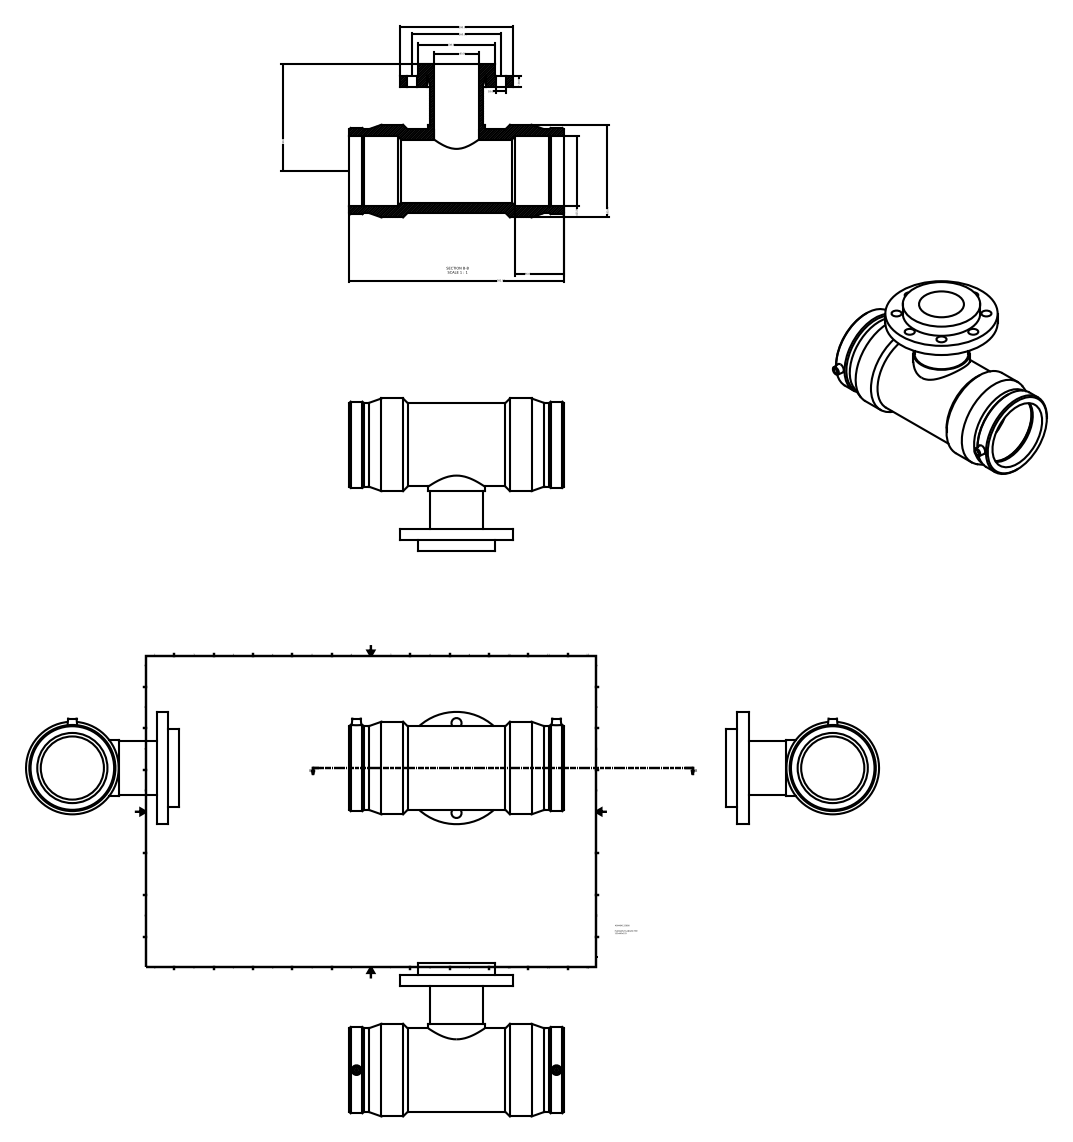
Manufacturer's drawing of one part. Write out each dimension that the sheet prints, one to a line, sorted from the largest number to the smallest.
382.00
200.00
190.00
165.00
160.00
138.00
n125.00
86.00
n80.00
20.00
18.00
